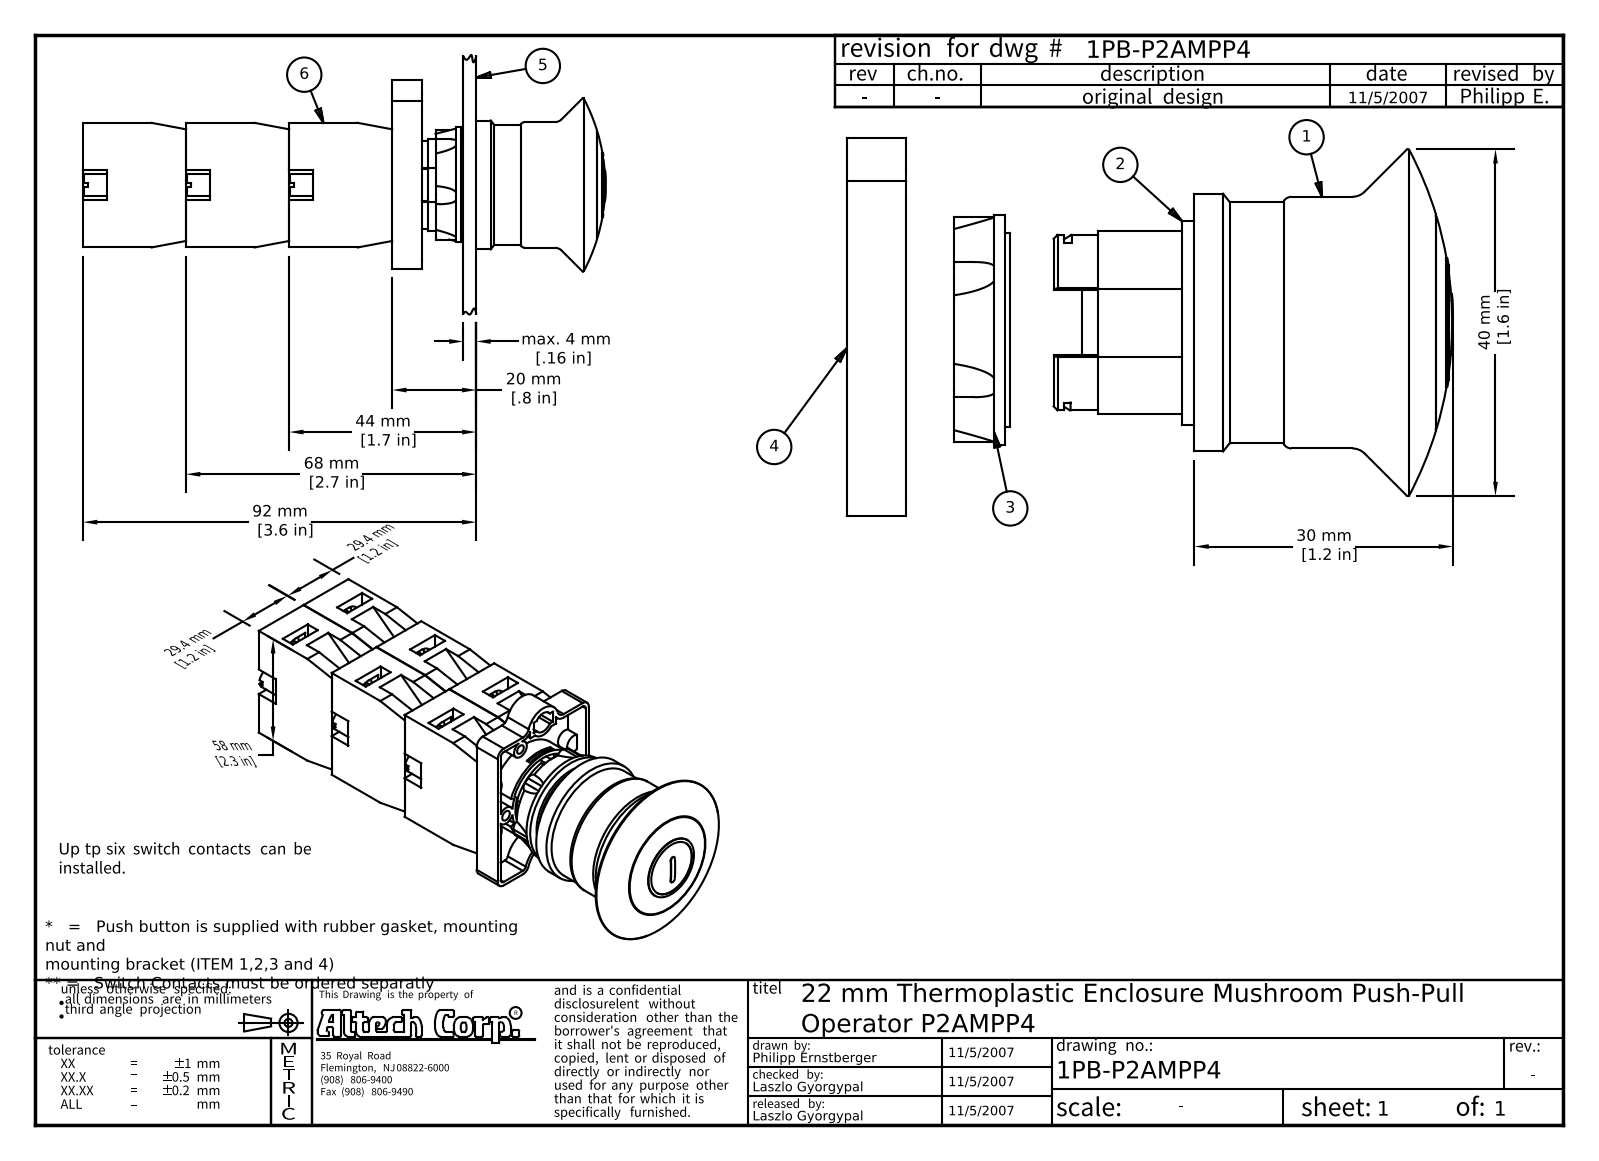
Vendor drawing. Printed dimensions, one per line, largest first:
92 mm [3.6 in]
68 mm [2.7 in]
58 mm [2.3 in]
44 mm [1.7 in]
40 mm [1.6 in]
30 mm [1.2 in]
29.4 mm [1.2 in]
29.4 mm [1.2 in]
20 mm [.8 in]
max. 4 mm [.16 in]
